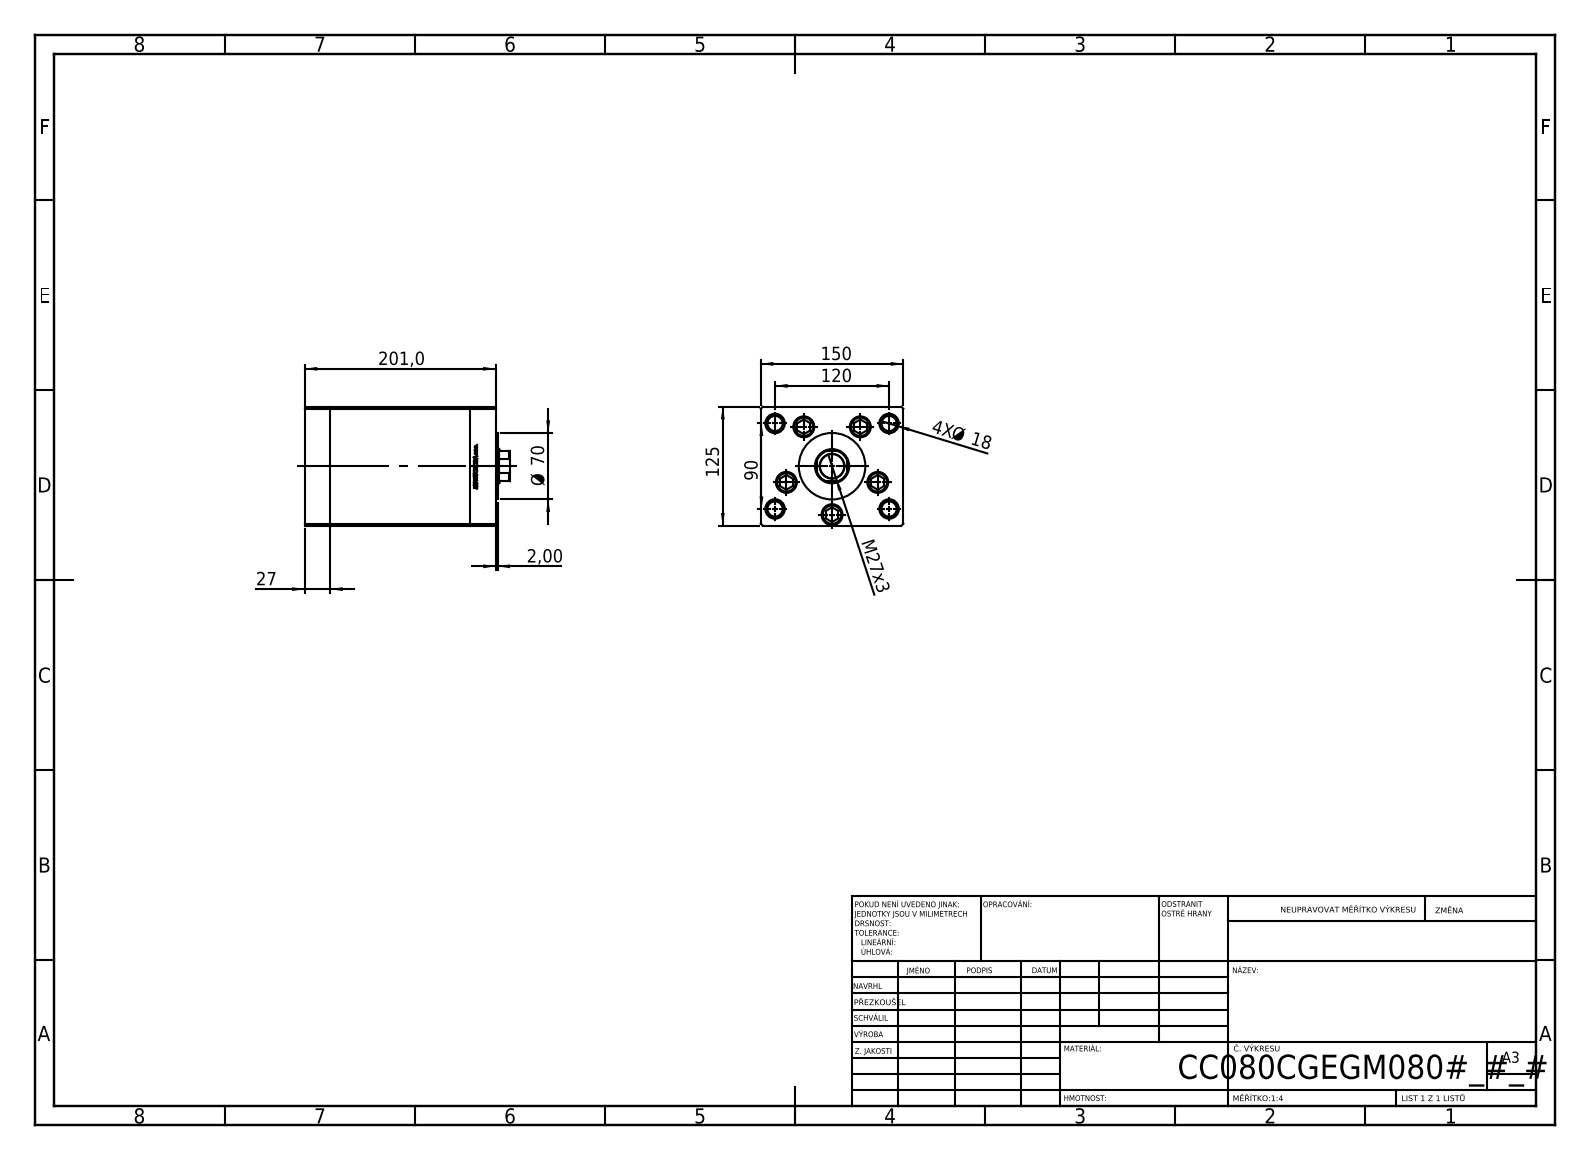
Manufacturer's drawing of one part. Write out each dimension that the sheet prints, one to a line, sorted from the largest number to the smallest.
201,0
150
125
120
90
Ø 70
27
M27x3
4X Ø 18
2,00
